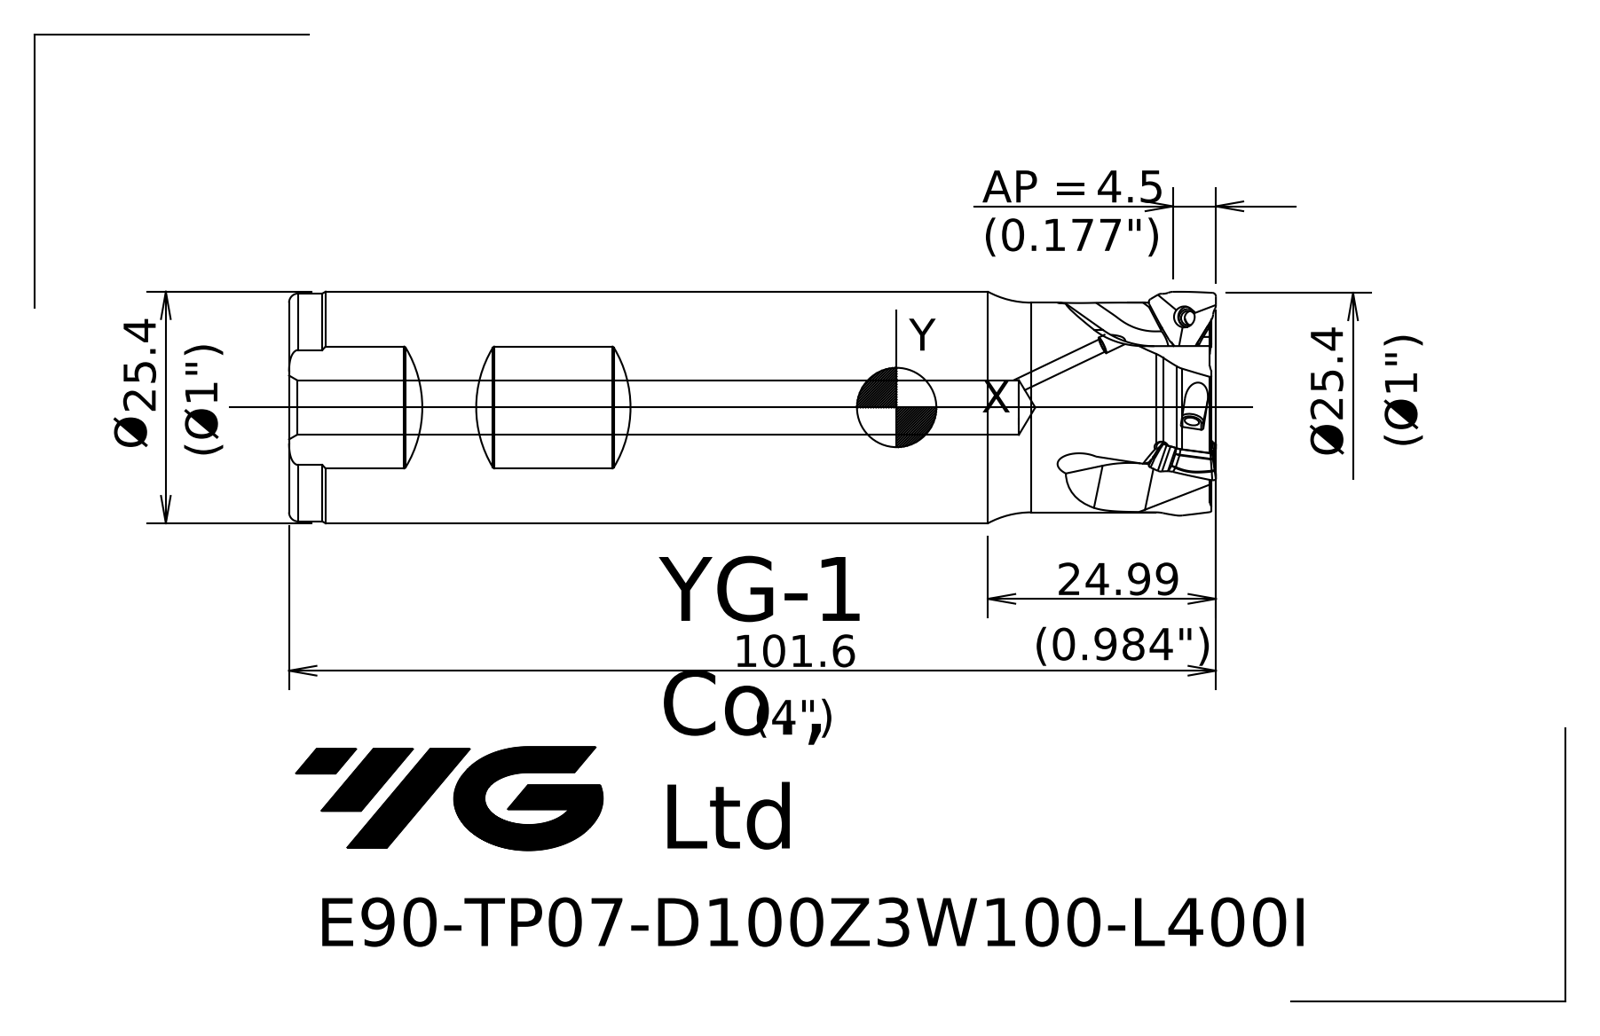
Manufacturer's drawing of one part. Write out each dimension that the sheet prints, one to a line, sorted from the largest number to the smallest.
101.6
Ø25.4
24.99
4.5 AP =
